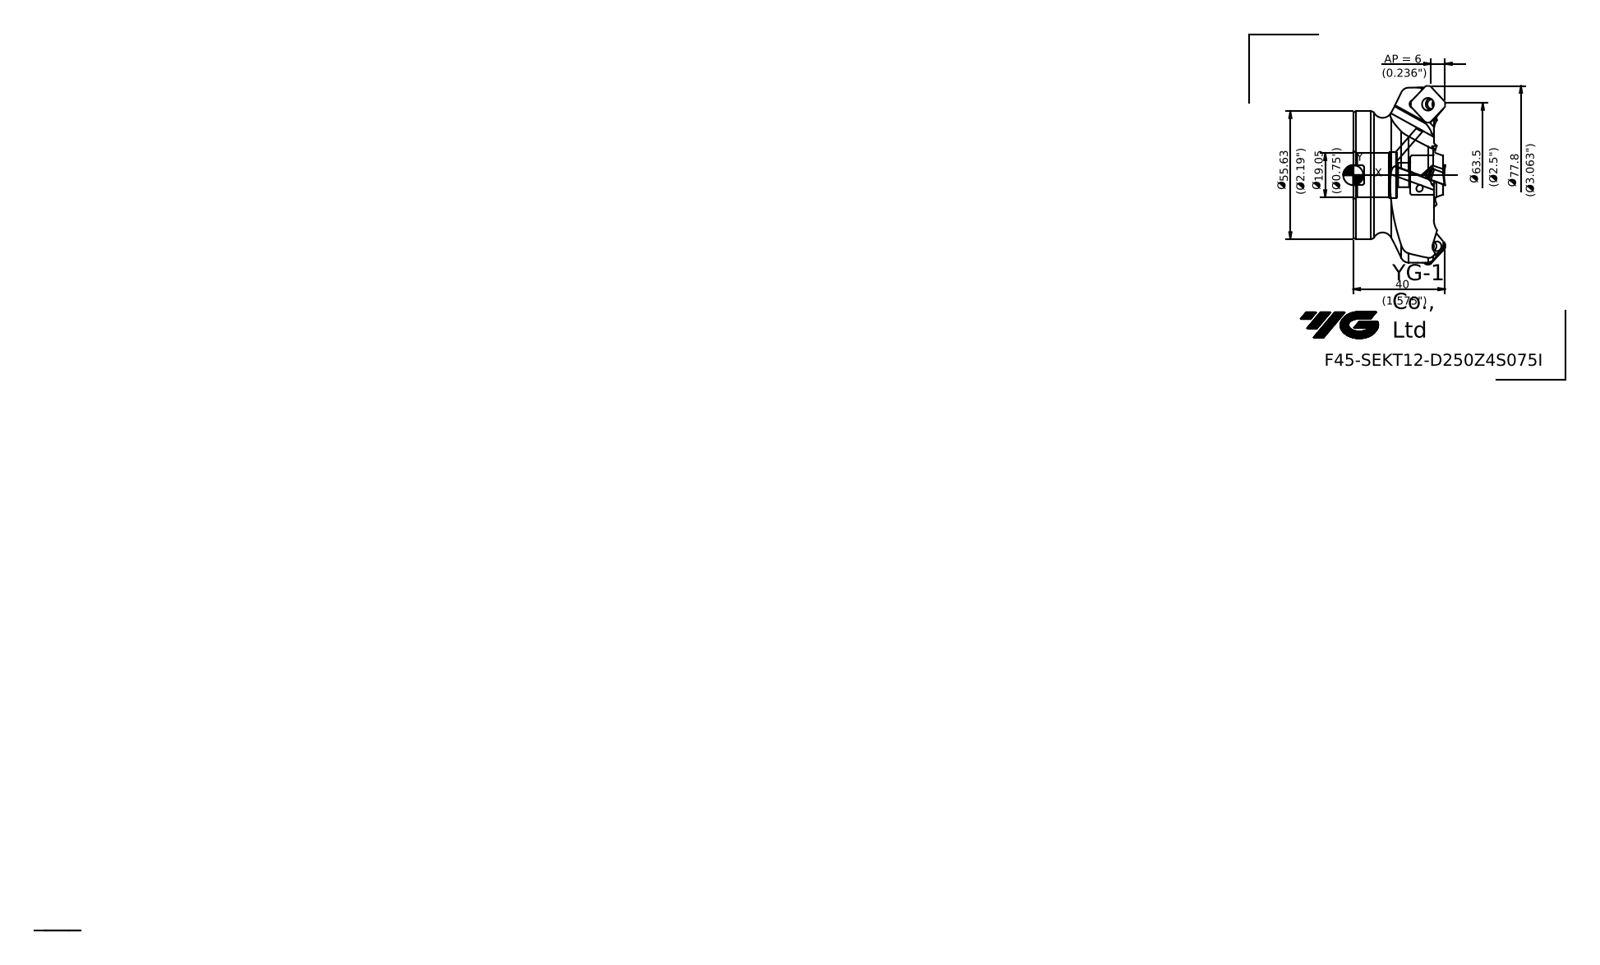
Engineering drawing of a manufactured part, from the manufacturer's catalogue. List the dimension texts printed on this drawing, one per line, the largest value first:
77.8 Ø
63.5 Ø
Ø 55.63
40
Ø 19.05
AP = 6
